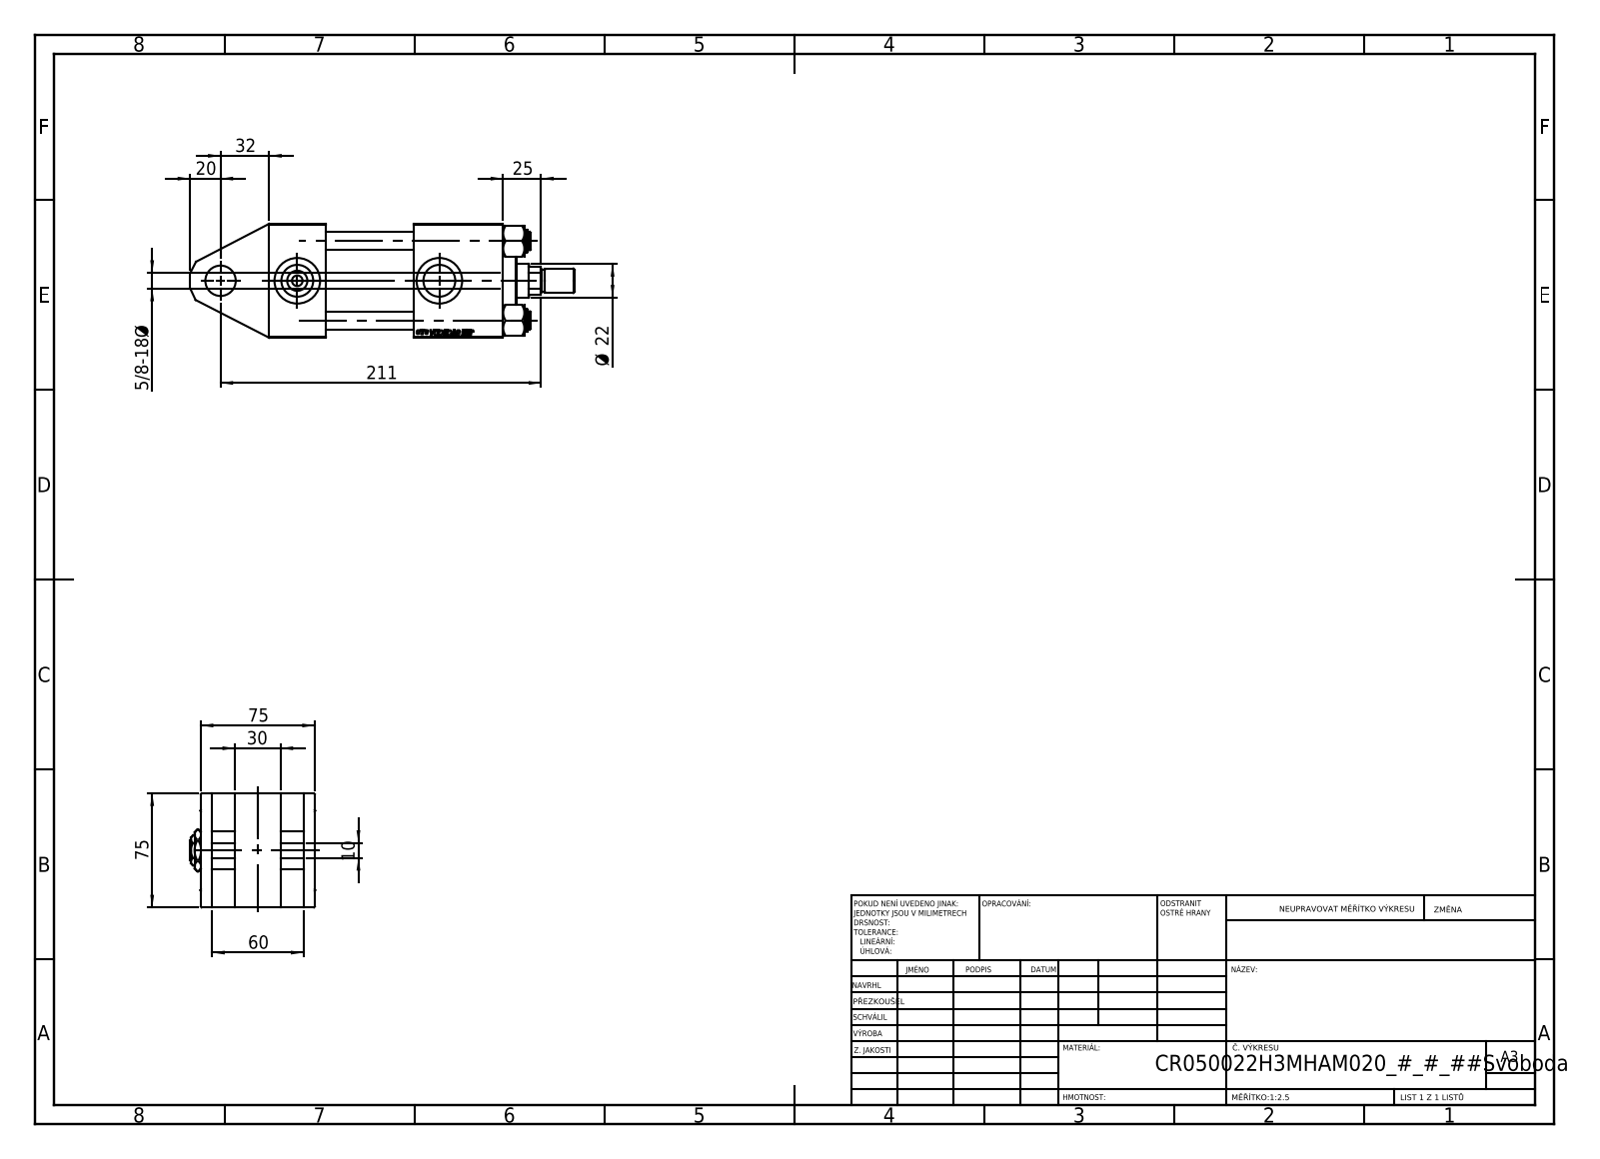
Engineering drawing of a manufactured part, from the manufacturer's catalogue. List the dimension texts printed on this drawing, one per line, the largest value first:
211
75
75
60
32
30
25
Ø 22
20
10
5/8-18 Ø
